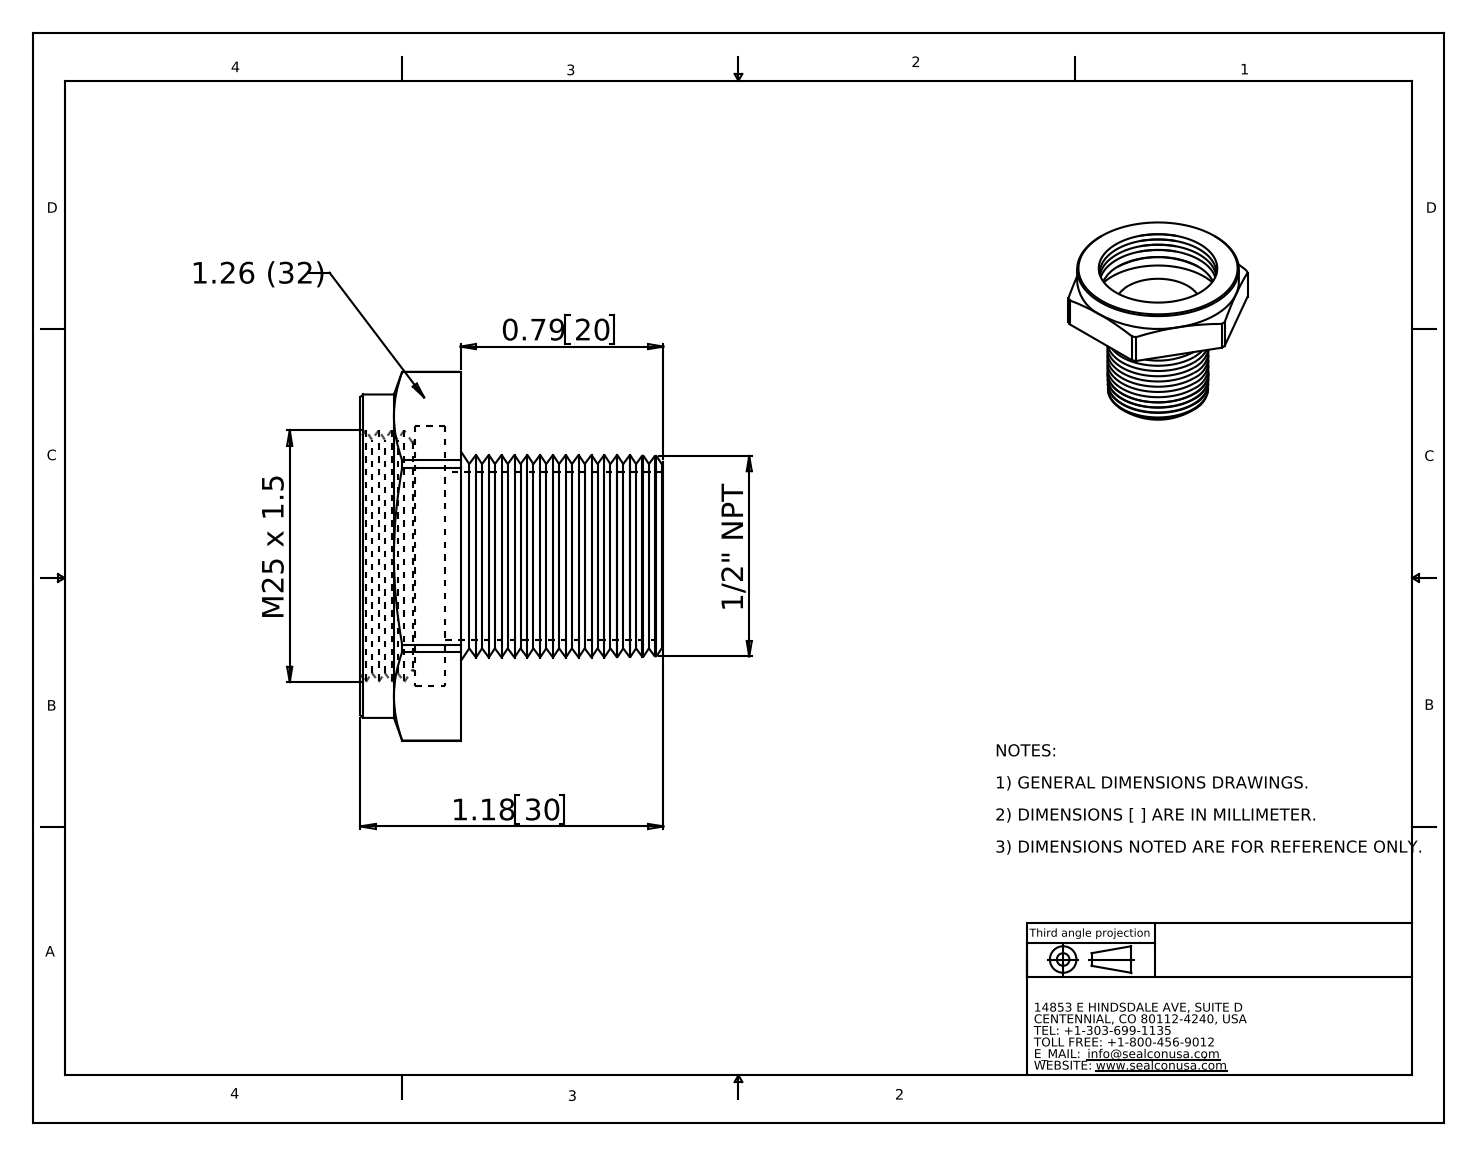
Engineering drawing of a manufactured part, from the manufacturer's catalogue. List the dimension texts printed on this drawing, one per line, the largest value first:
M25 x 1.5
1.18 30
0.79 20
1/2" NPT
